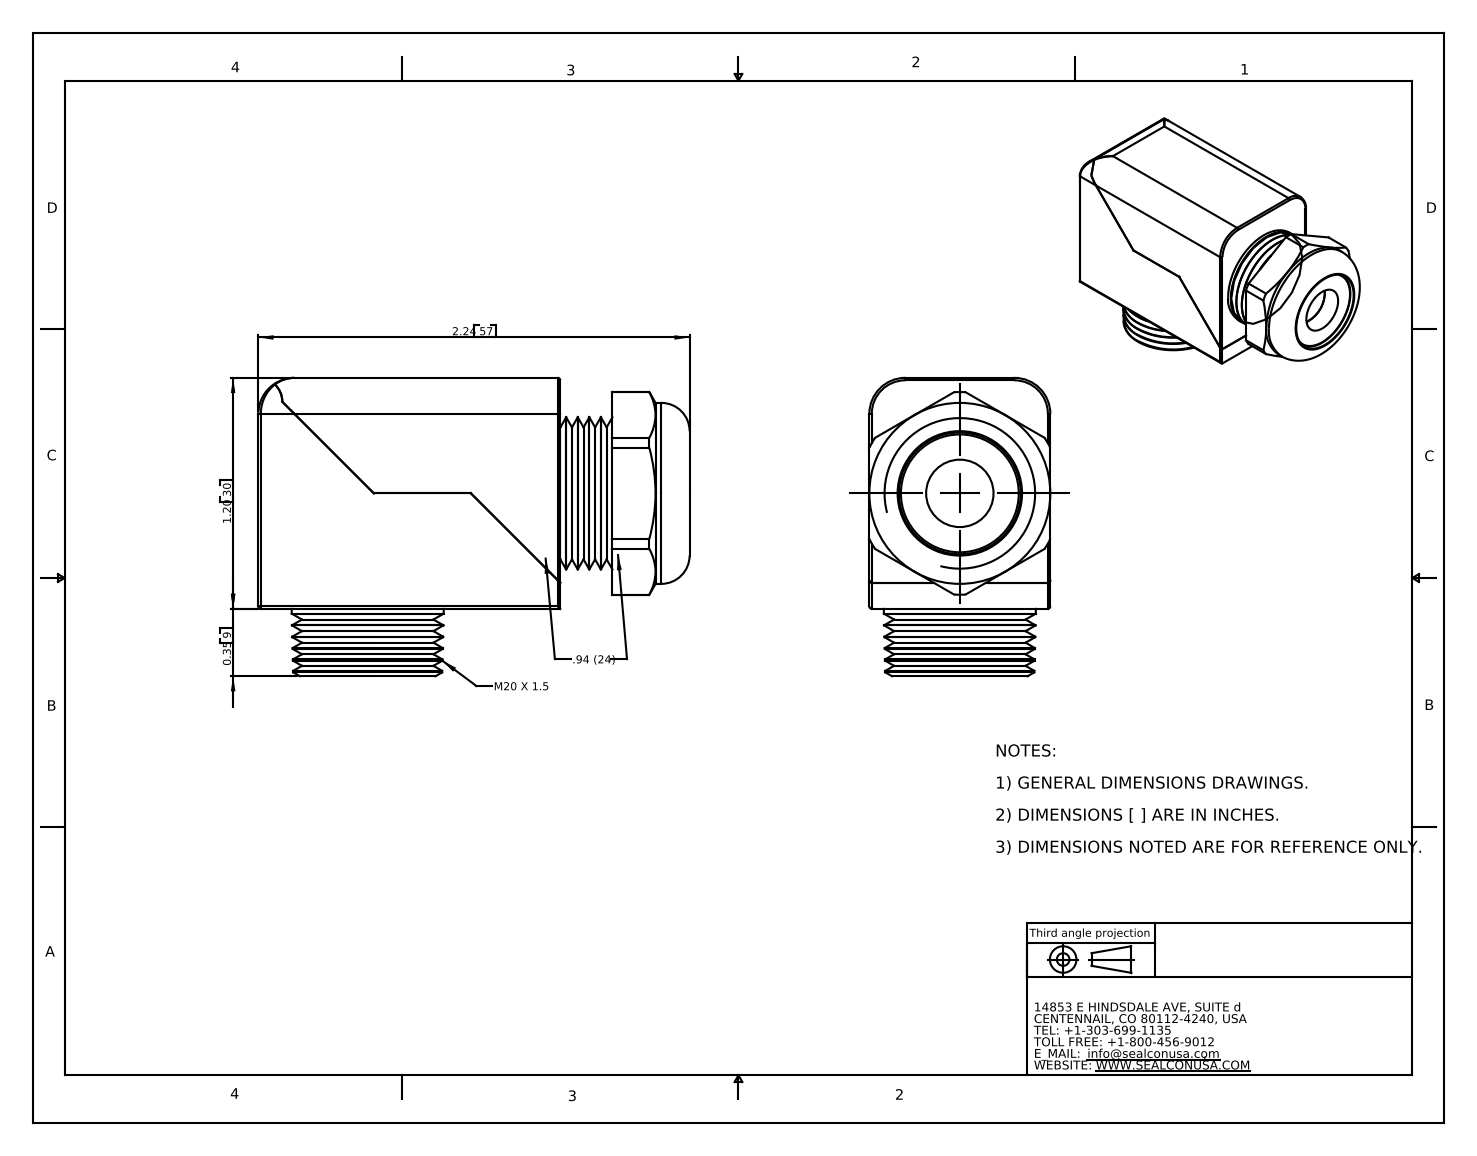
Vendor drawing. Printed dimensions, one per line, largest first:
2.24 57
1.20 30
0.35 9
